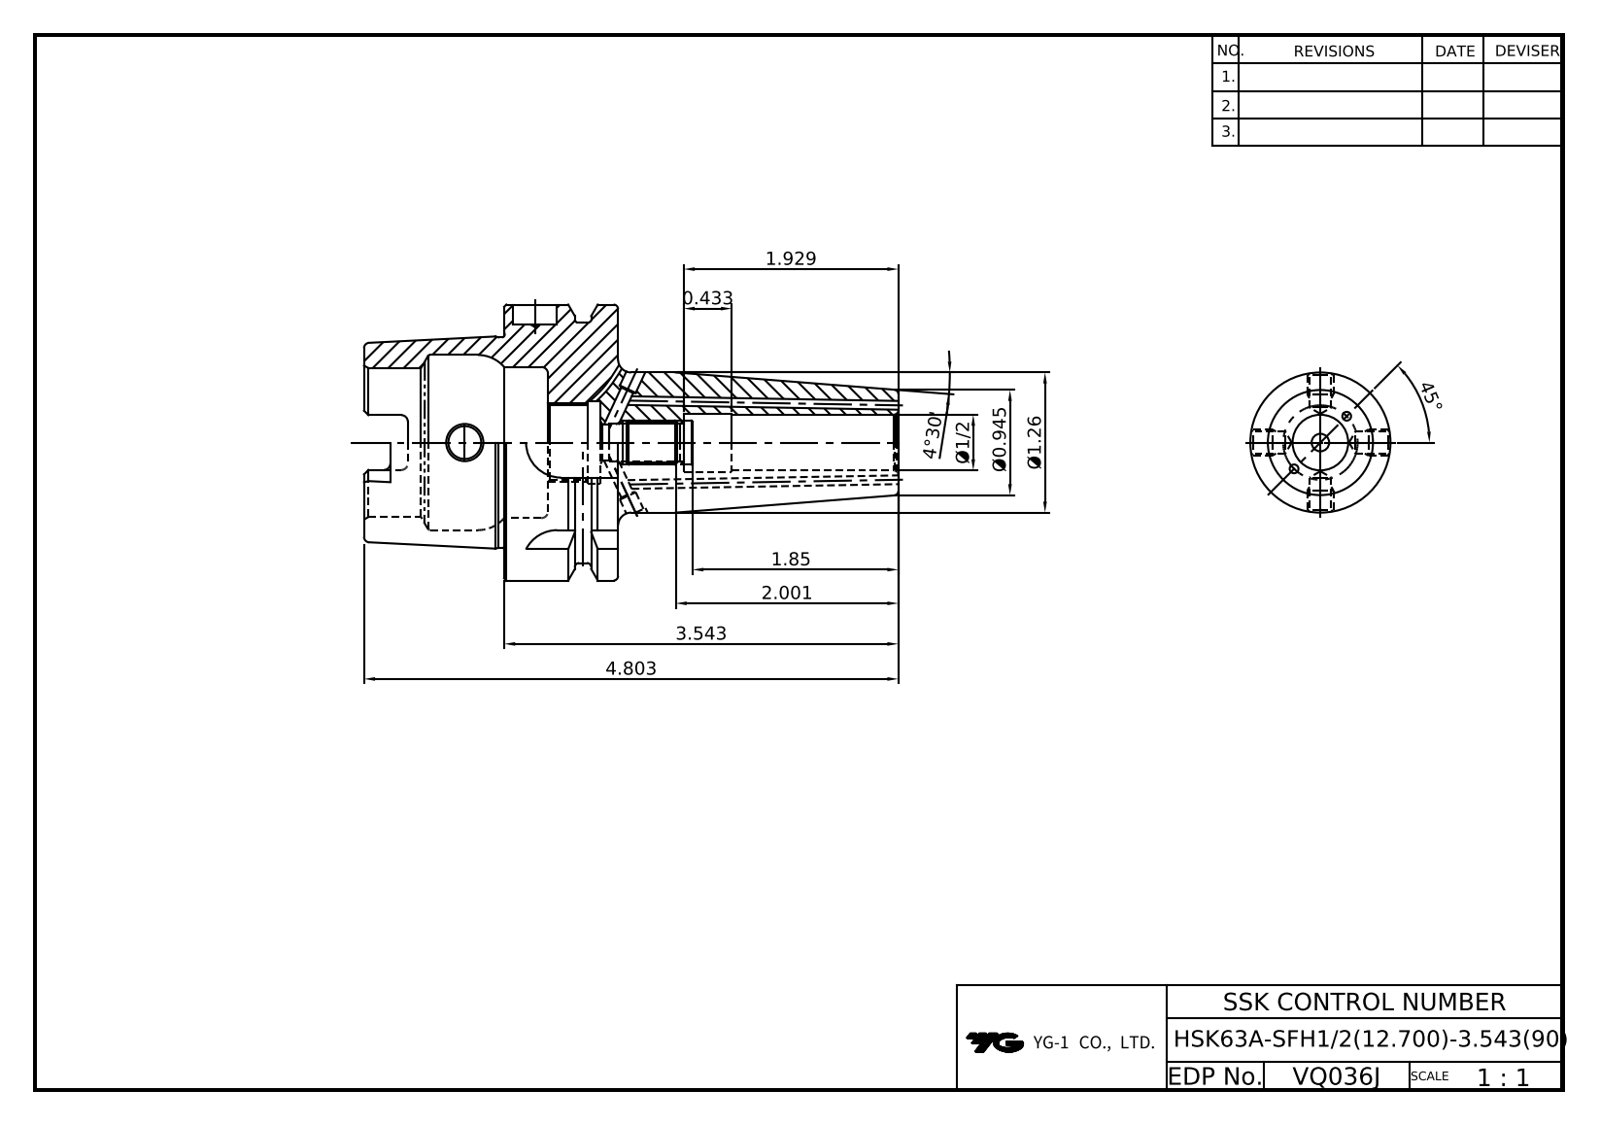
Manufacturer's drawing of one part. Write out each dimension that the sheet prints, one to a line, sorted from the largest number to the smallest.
45°
4.803
4°30'
3.543
2.001
1.929
1.85
Ø1.26
Ø0.945
Ø1/2
0.433
